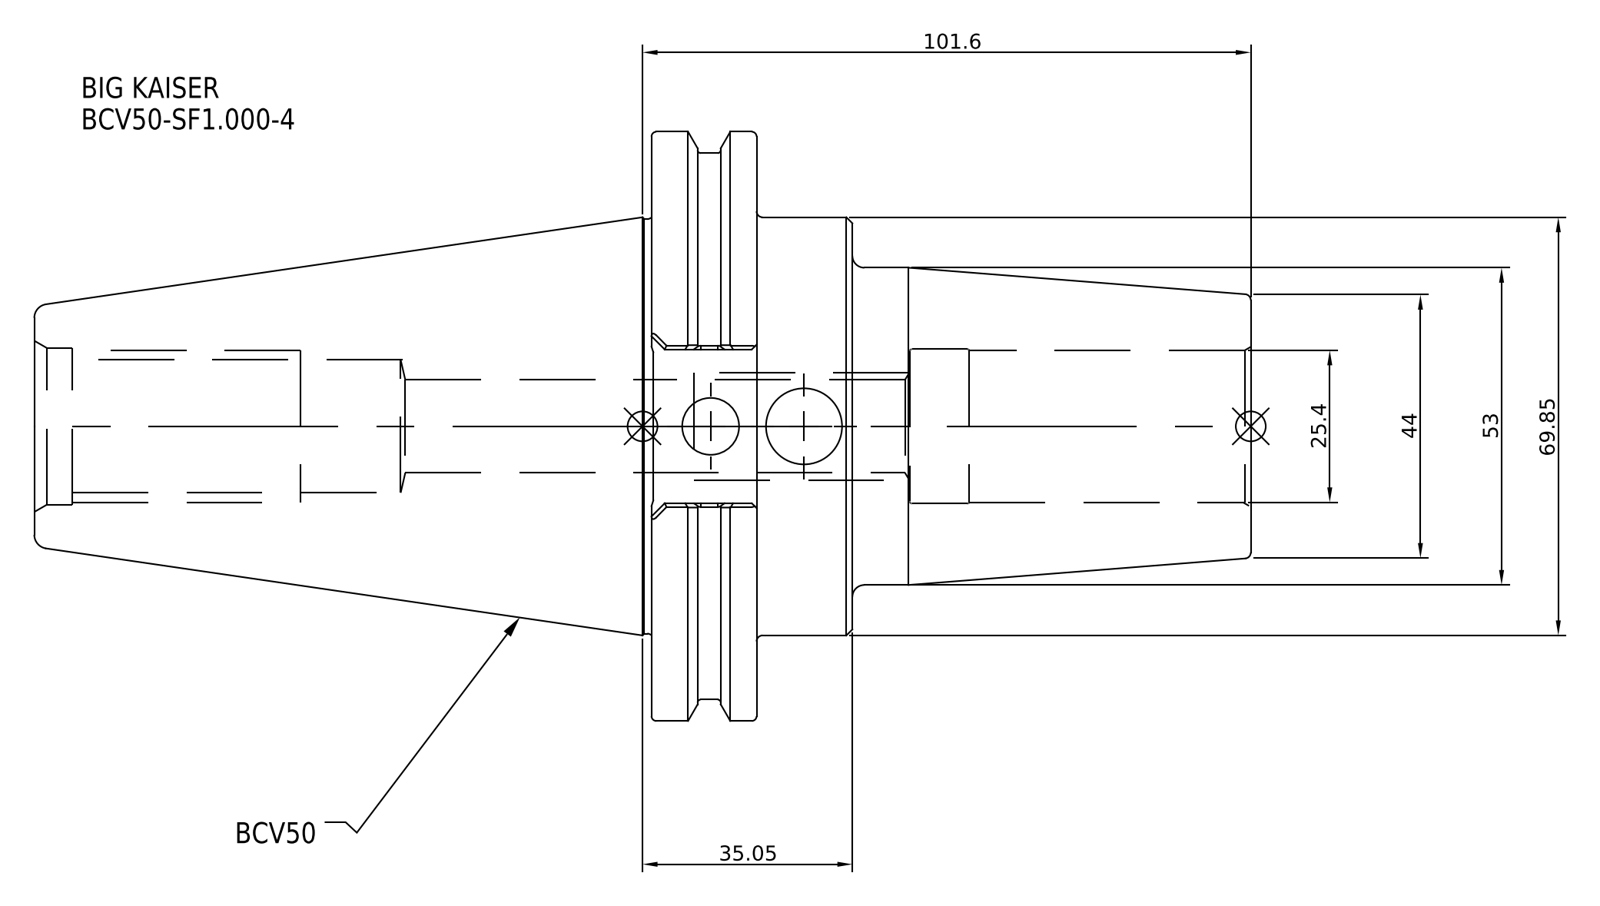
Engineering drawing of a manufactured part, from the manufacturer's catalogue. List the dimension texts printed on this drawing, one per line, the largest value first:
101.6
69.85
53
44
35.05
25.4
